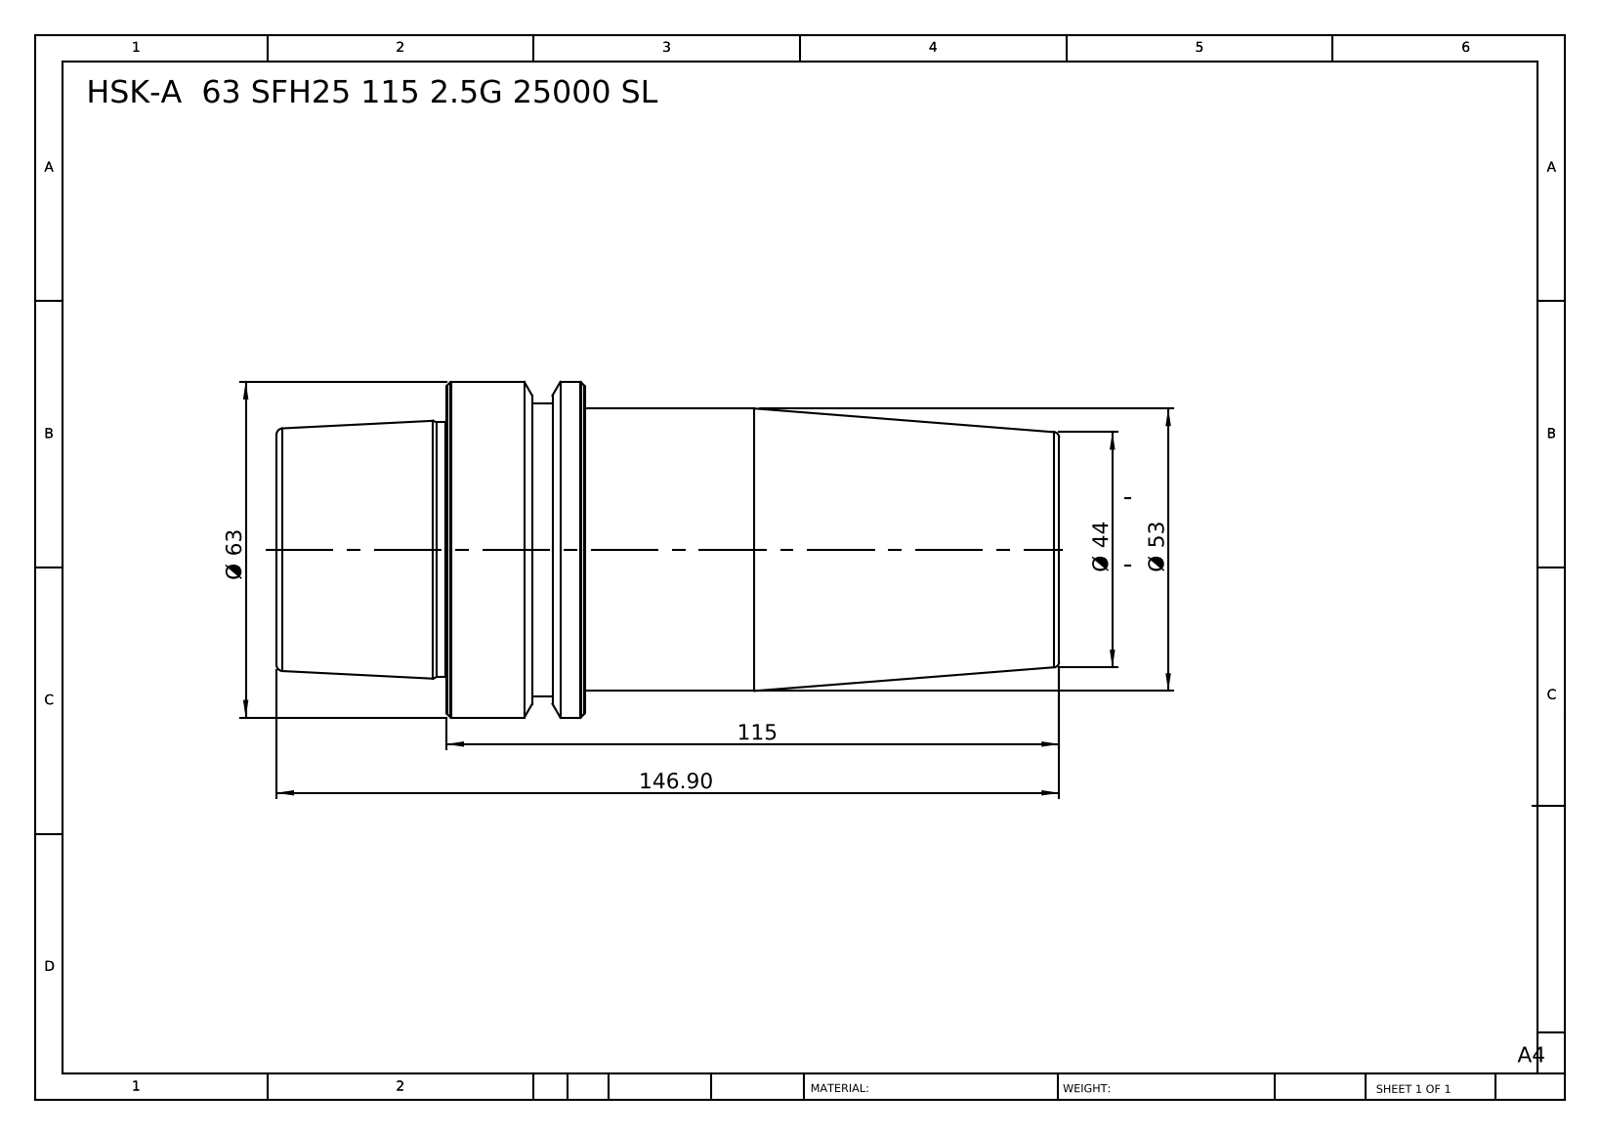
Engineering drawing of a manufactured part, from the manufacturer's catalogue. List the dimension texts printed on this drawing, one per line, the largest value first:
146.90
115
Ø 63
Ø 53
Ø 44
